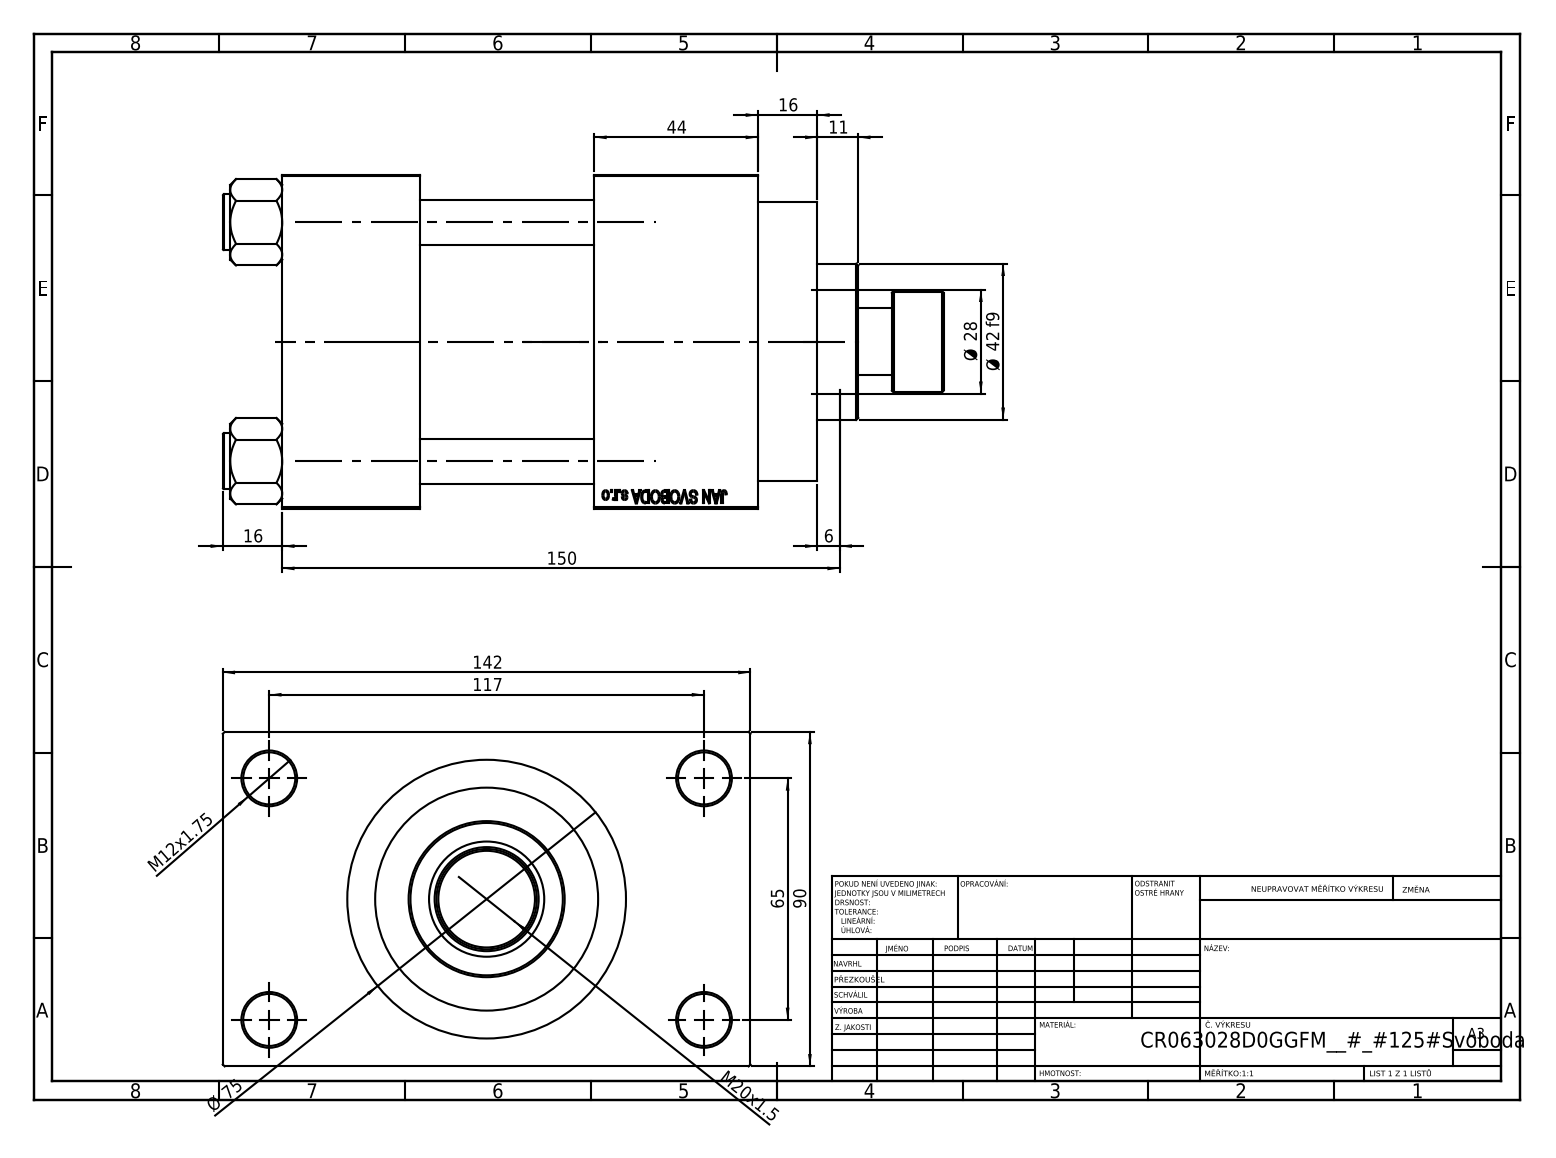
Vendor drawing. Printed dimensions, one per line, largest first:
150
142
117
90
Ø 75
65
44
Ø 42 f9
Ø 28
M20x1.5
16
16
M12x1.75
11
6
